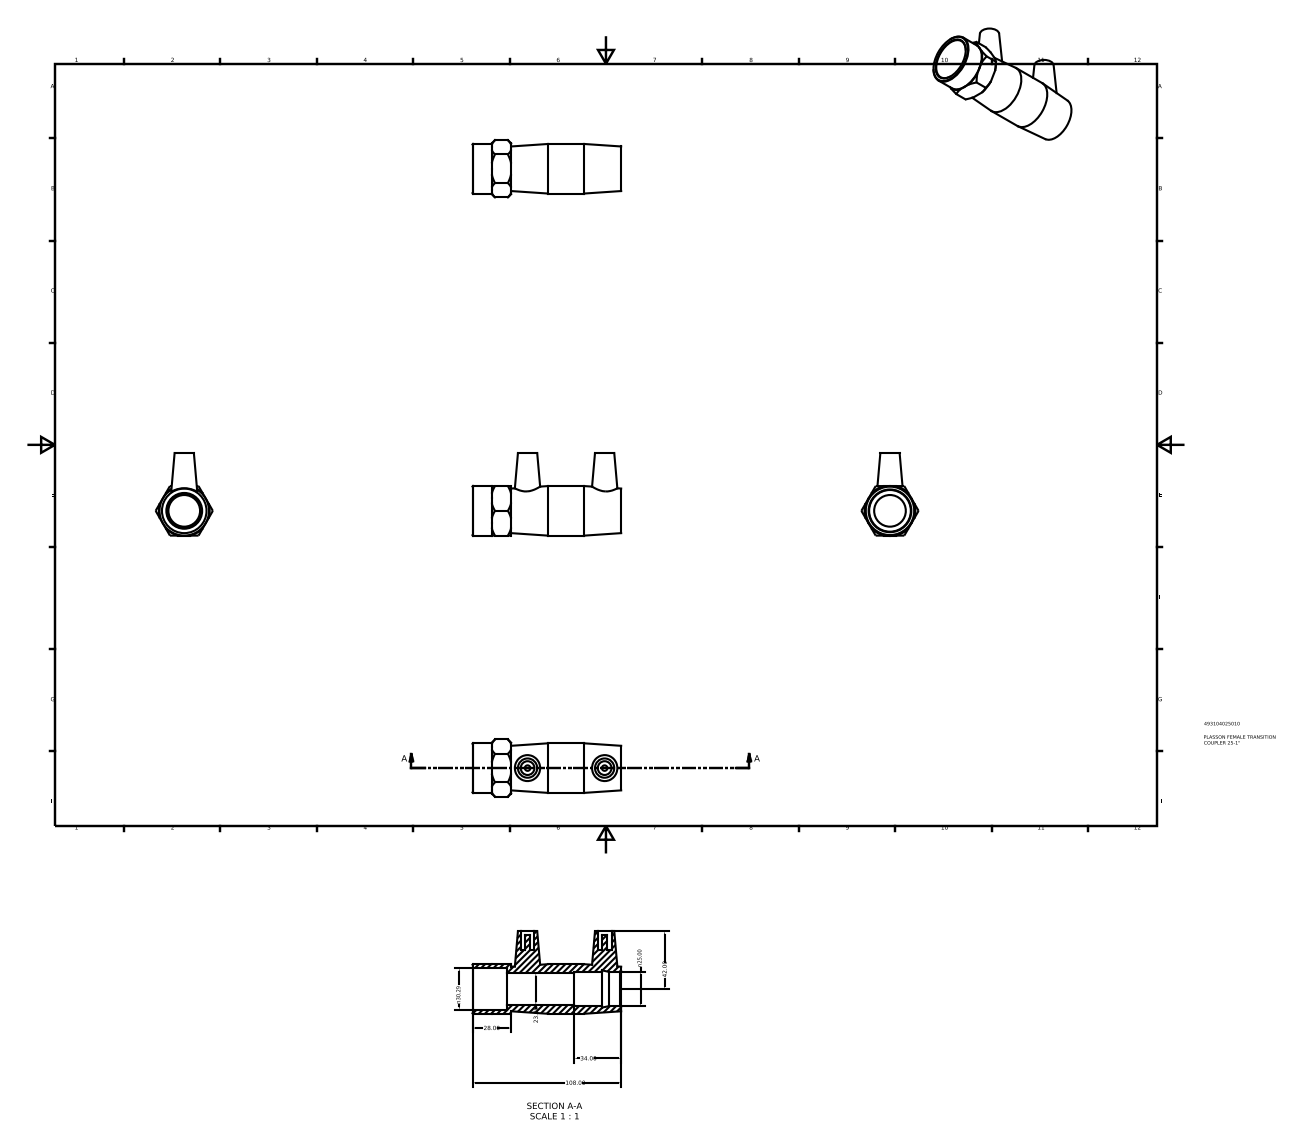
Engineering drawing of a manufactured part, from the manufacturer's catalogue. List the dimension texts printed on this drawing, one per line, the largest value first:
108.00
42.00
34.00
n30.29
28.00
n25.00
23.00
